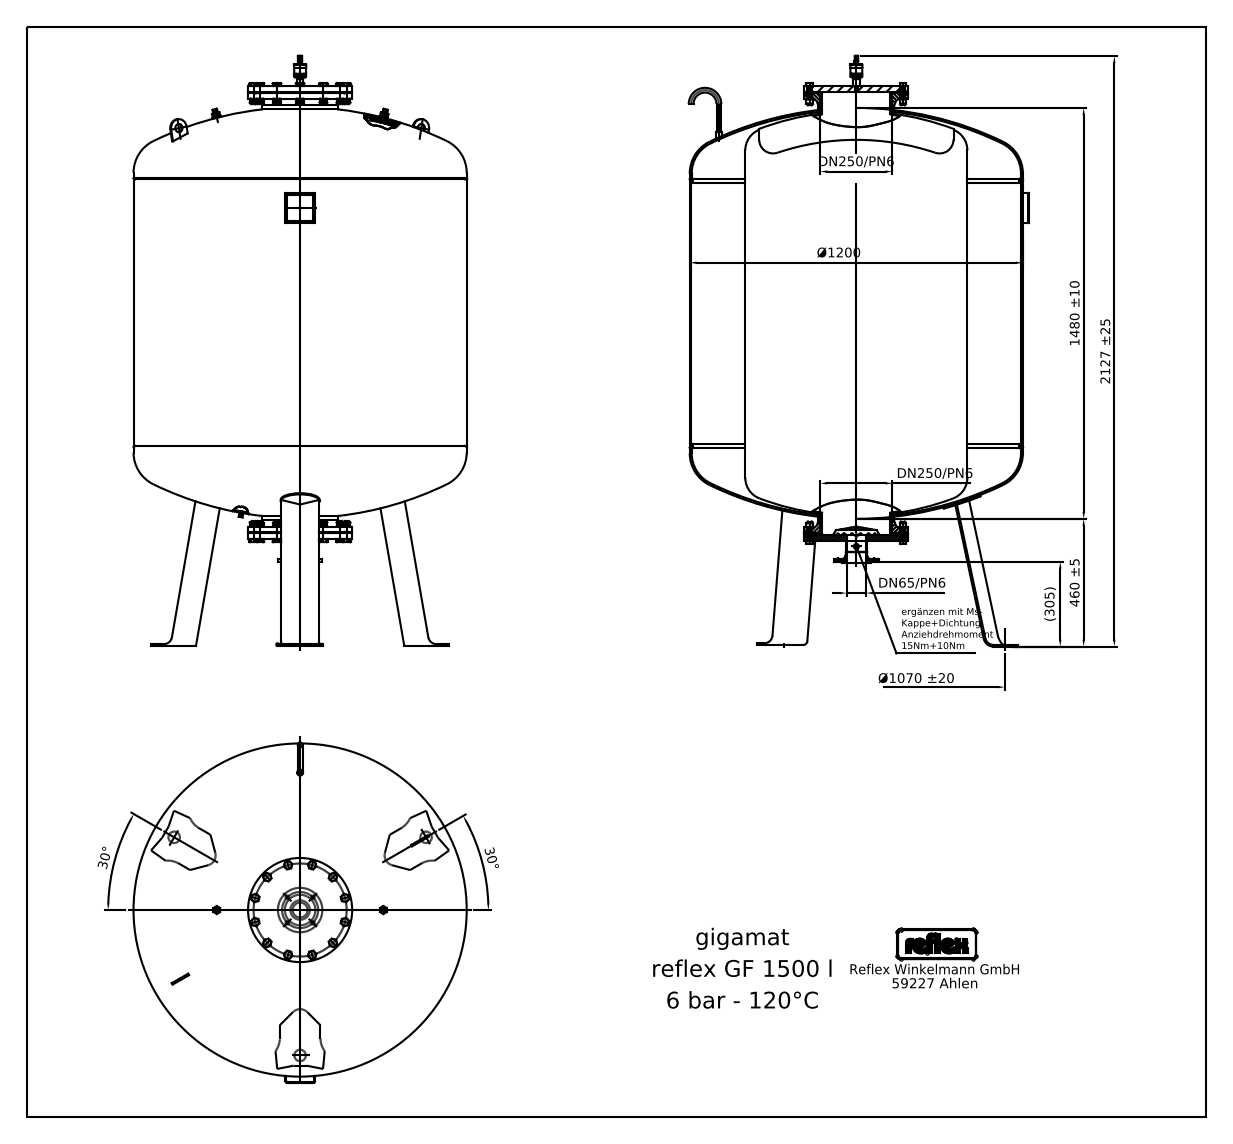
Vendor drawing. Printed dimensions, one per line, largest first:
2127 ±25
1480 ±10
Ø1200
Ø1070 ±20
460 ±5
(305)
DN250/PN6
DN250/PN6
DN65/PN6
30°
30°
